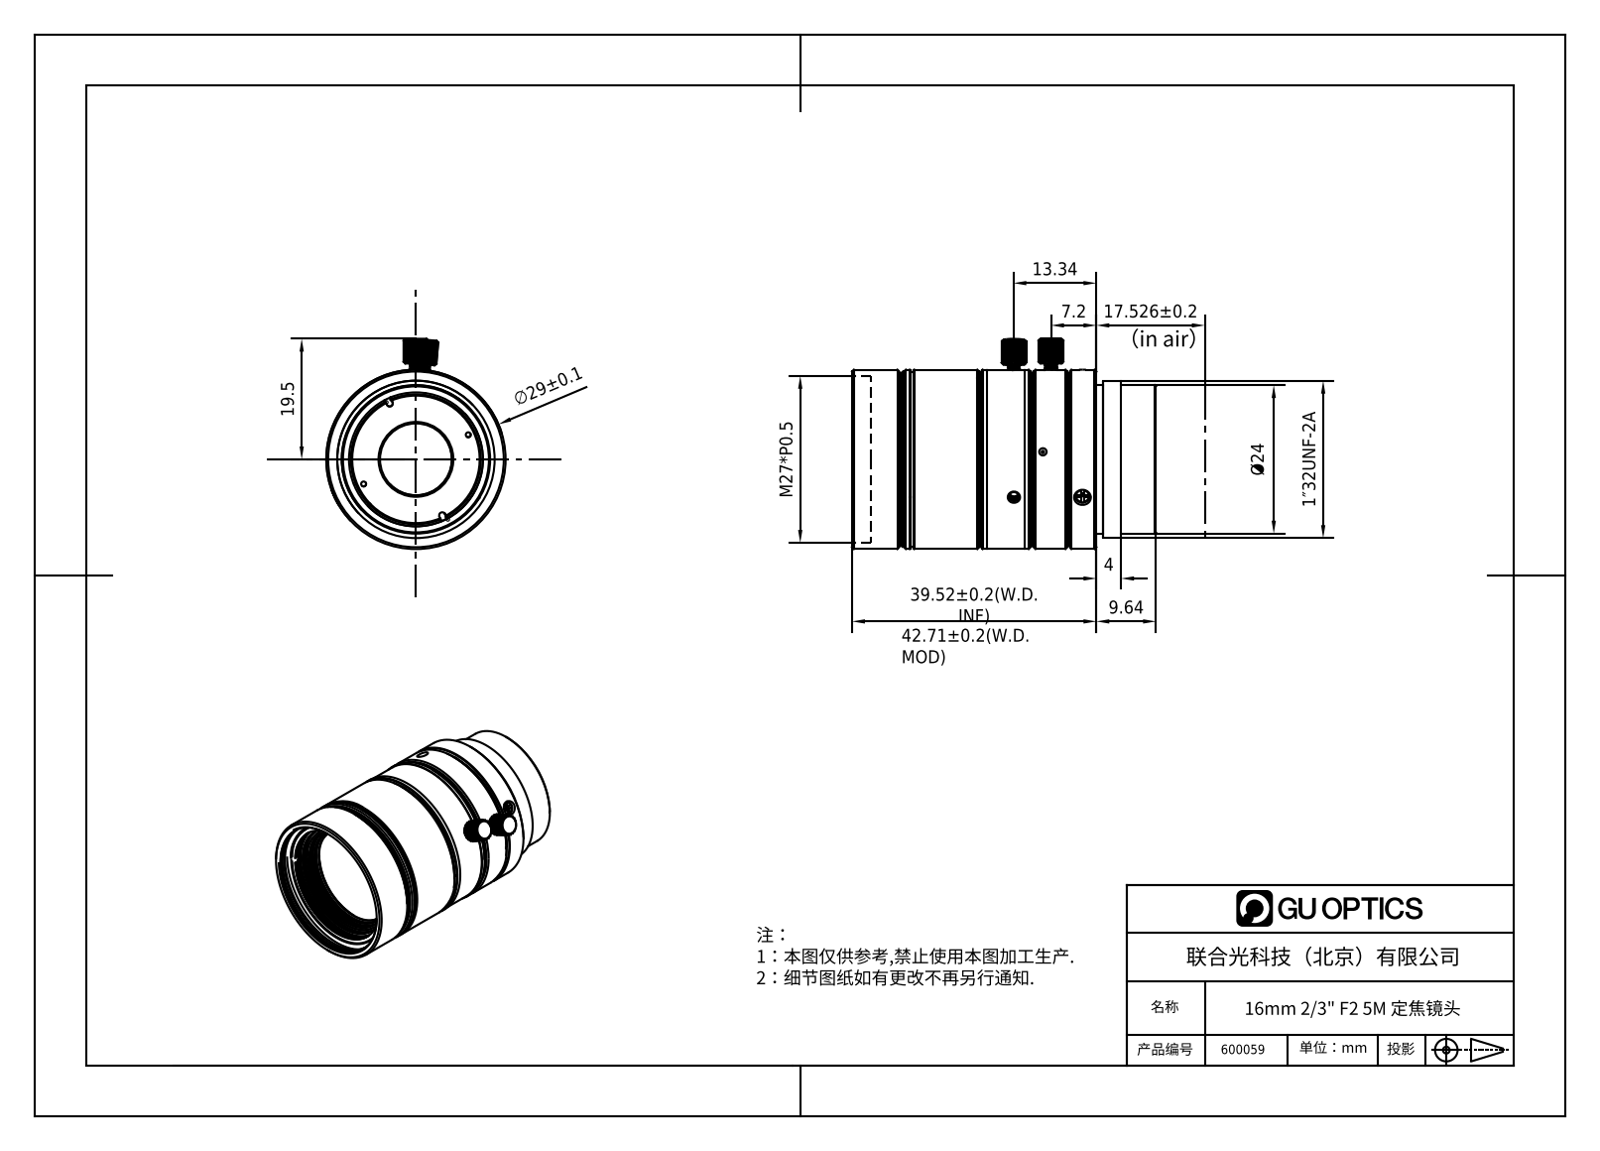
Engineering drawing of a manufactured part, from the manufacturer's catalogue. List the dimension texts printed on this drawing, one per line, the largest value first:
39.52±0.2(W.D. INF)
∅29±0.1
M27*P0.5
Ø24
19.5
17.526±0.2
13.34
9.64
7.2
4
1″32UNF-2A
